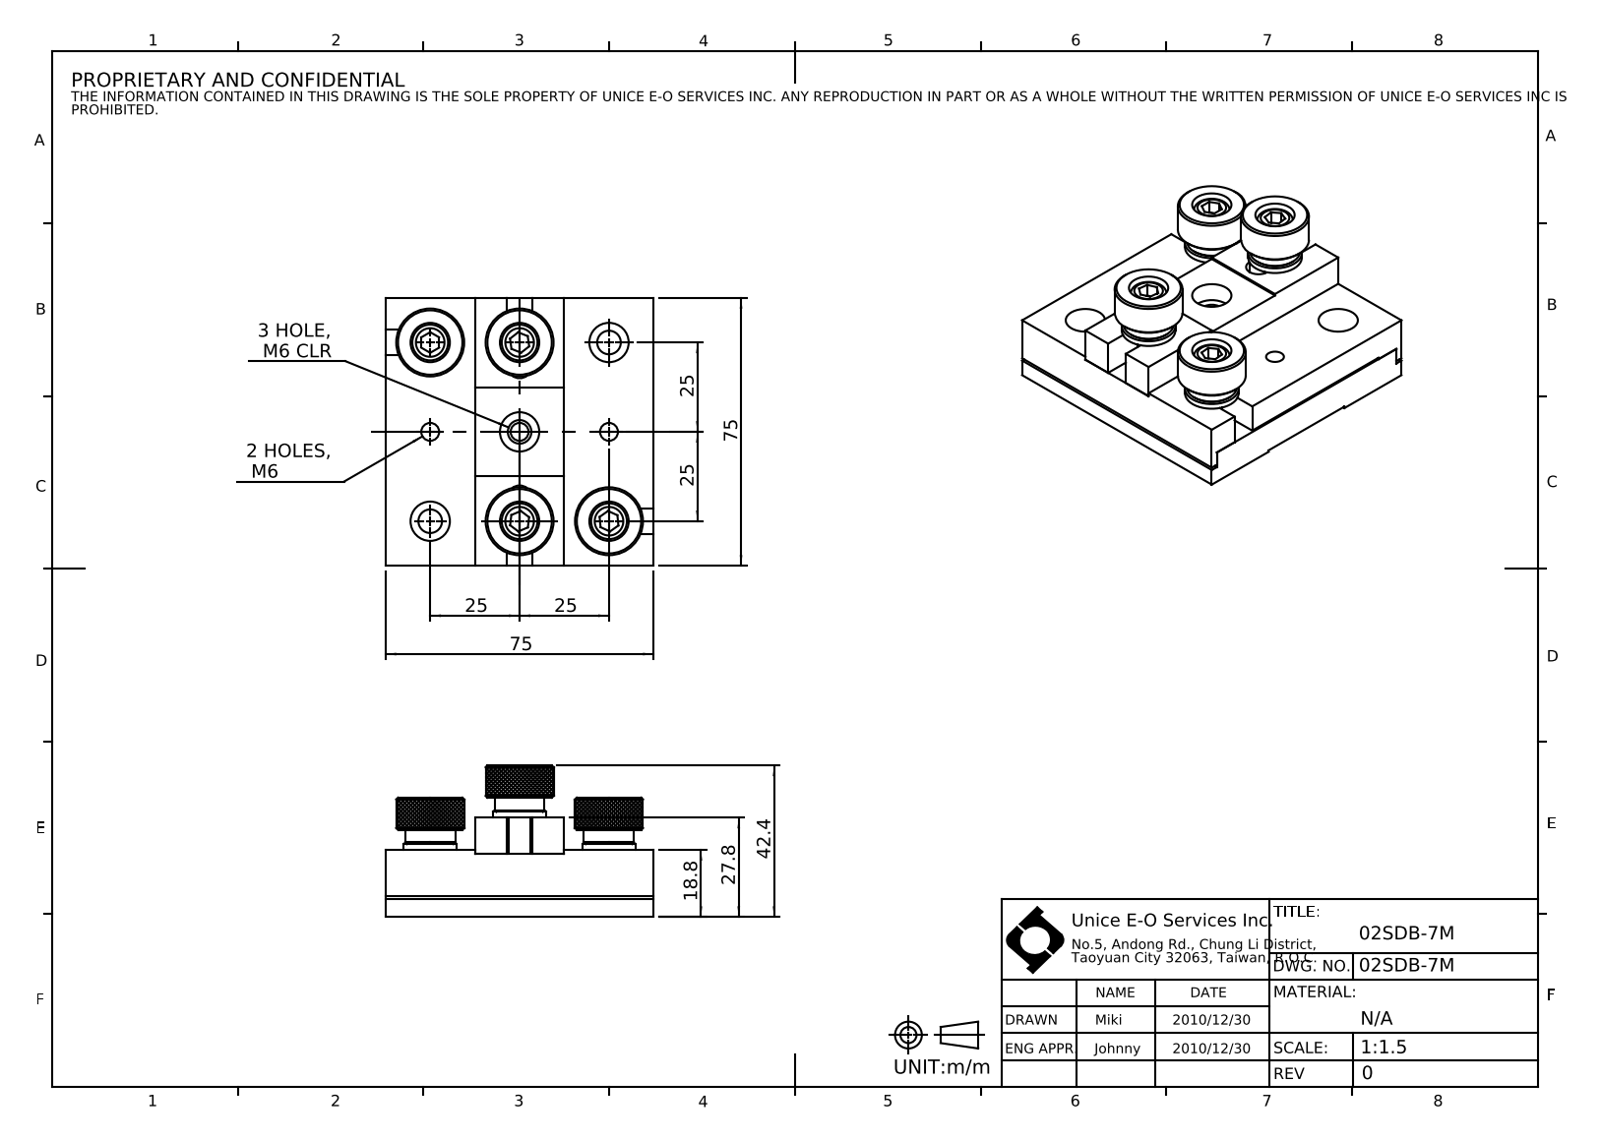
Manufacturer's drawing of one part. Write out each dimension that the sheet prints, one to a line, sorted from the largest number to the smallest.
75
75
42.4
27.8
25
25
25
25
18.8
M6 2 HOLES,
M6 CLR 3 HOLE,
